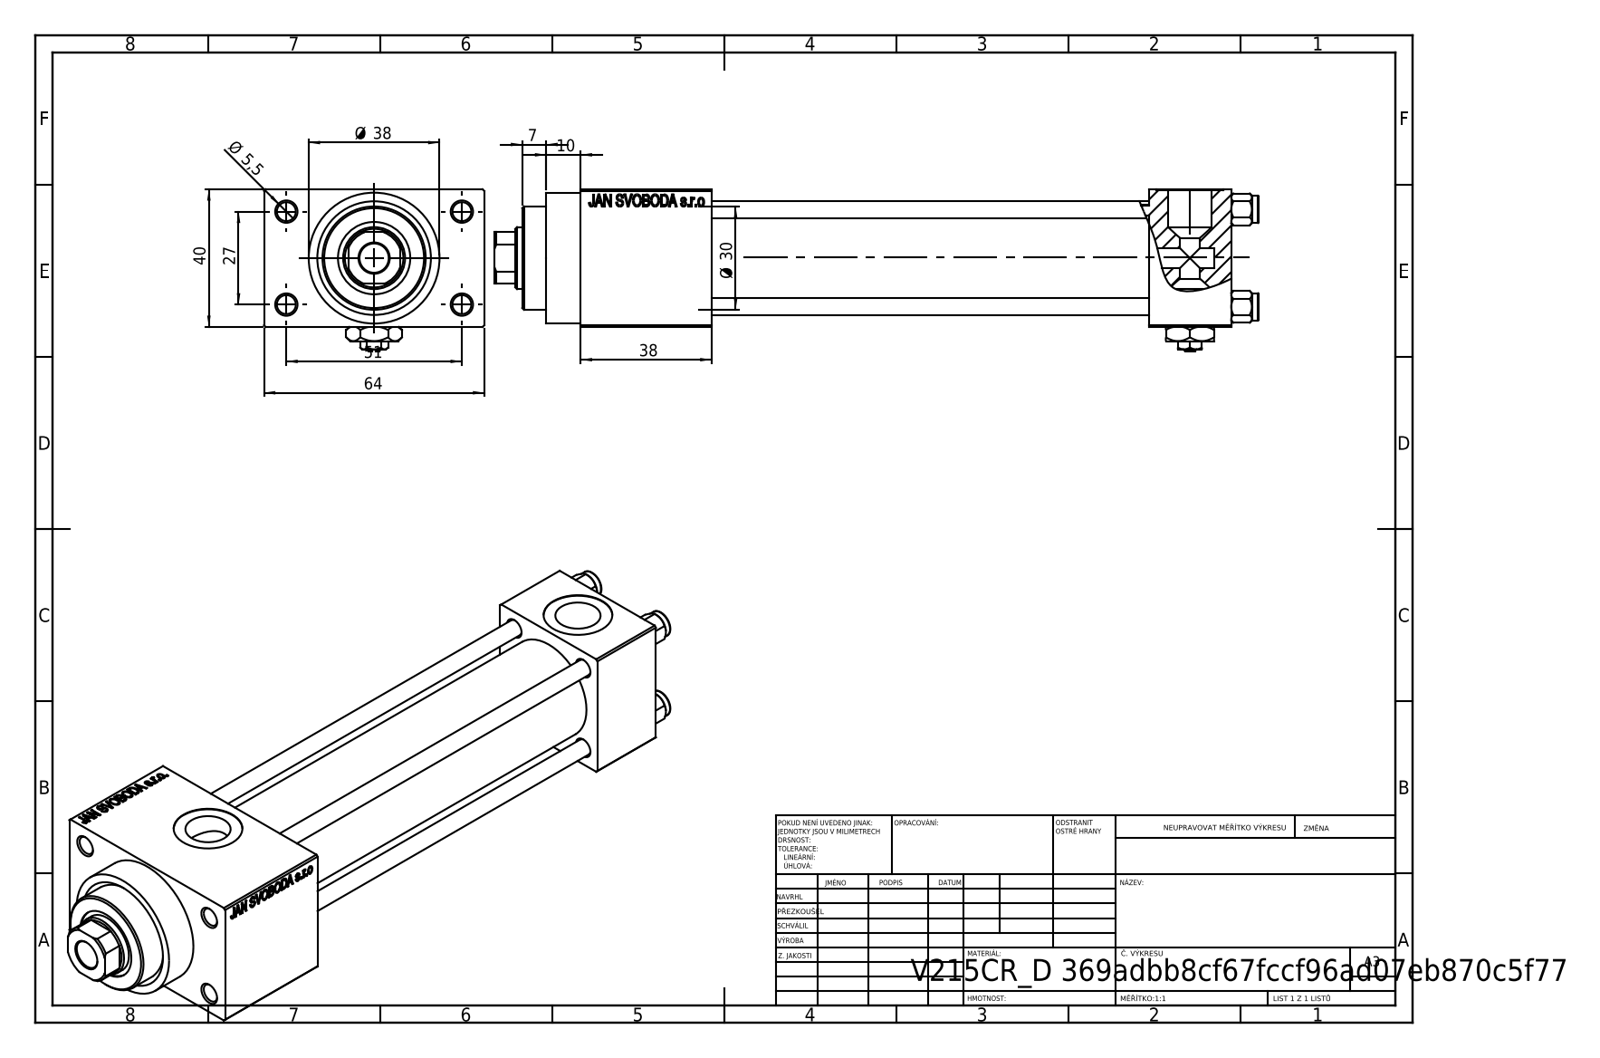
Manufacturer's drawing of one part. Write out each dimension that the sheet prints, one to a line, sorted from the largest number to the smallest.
64
51
40
38
Ø 38
Ø 30
27
10
7
Ø 5,5
